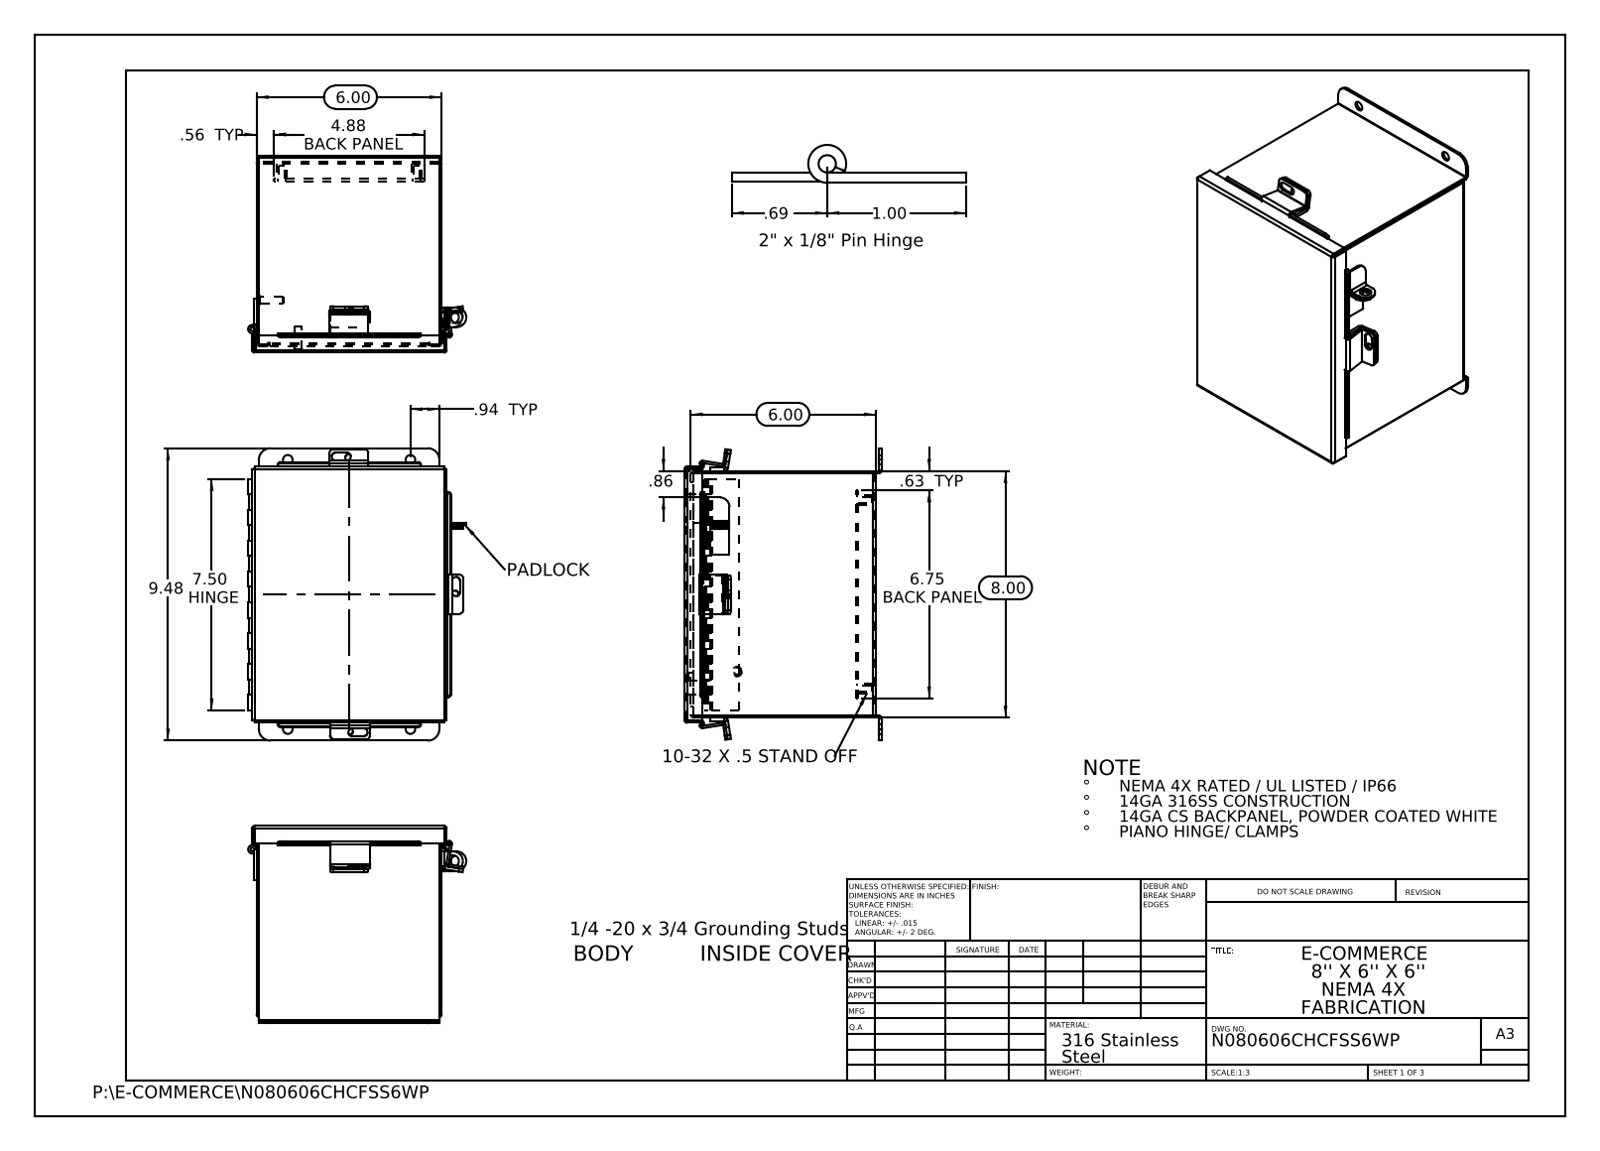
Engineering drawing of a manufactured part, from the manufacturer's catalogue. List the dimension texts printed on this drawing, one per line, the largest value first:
9.48
8.00
7.50 HINGE
6.75 BACK PANEL
6.00
6.00
4.88 BACK PANEL
1.00
.94 TYP
.86
.69
.63 TYP
.56 TYP
